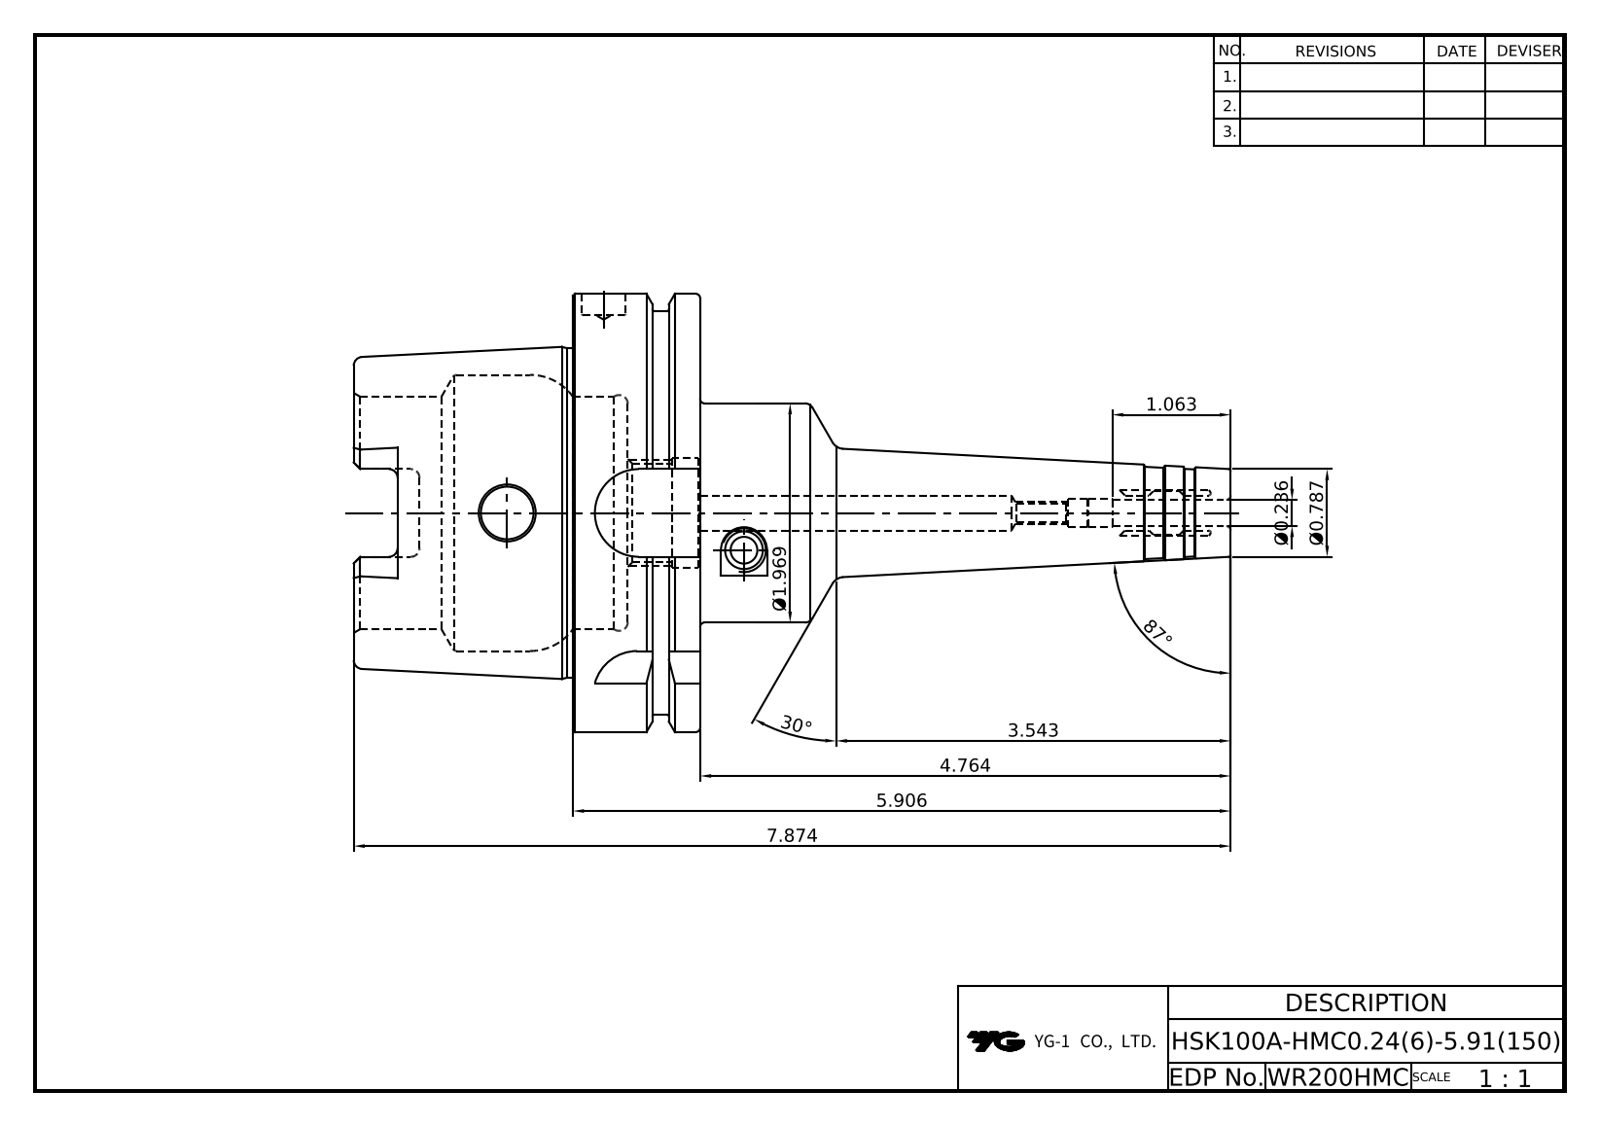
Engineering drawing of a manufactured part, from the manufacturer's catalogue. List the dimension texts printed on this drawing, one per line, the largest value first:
87°
30°
7.874
5.906
4.764
3.543
Ø1.969
1.063
Ø0.787
Ø0.236
